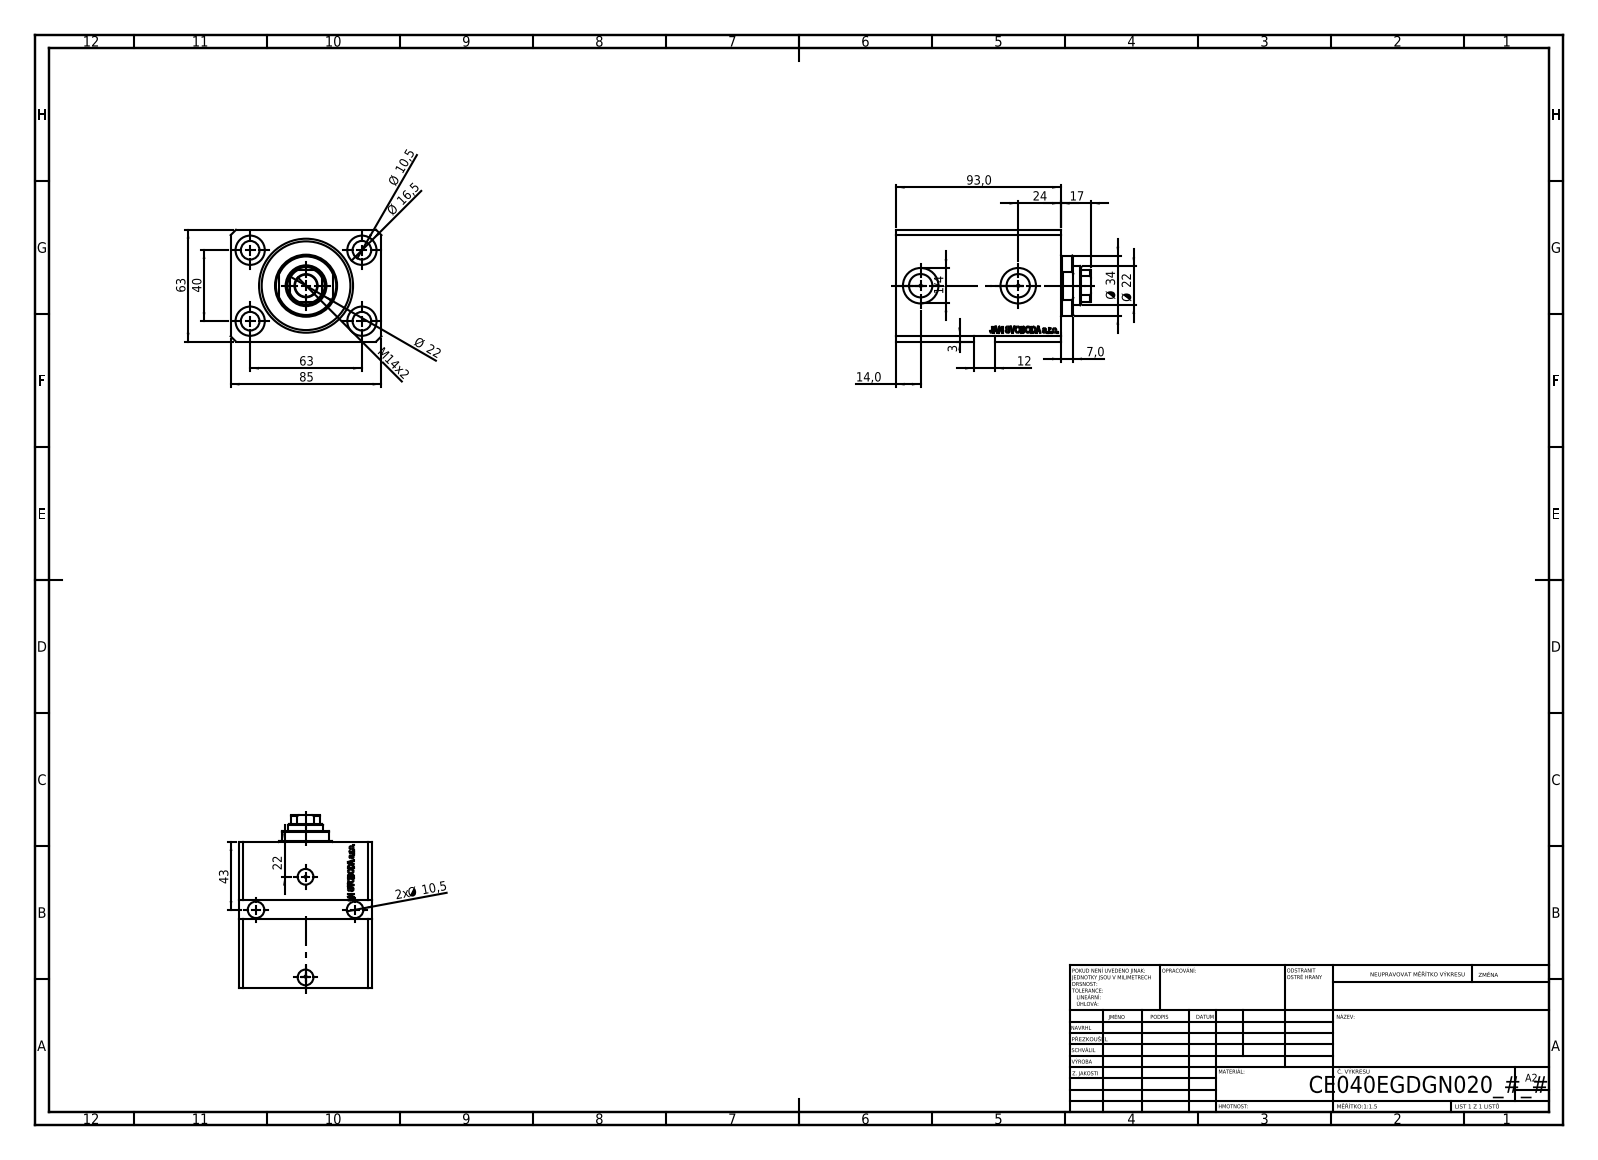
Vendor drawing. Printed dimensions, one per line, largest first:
93,0
85
63
63
43
40
Ø 34
24
Ø 22
Ø 22
22
17
Ø 16,5
M14x2
14,0
12
Ø 10,5
2x Ø 10,5
7,0
3
1/4
